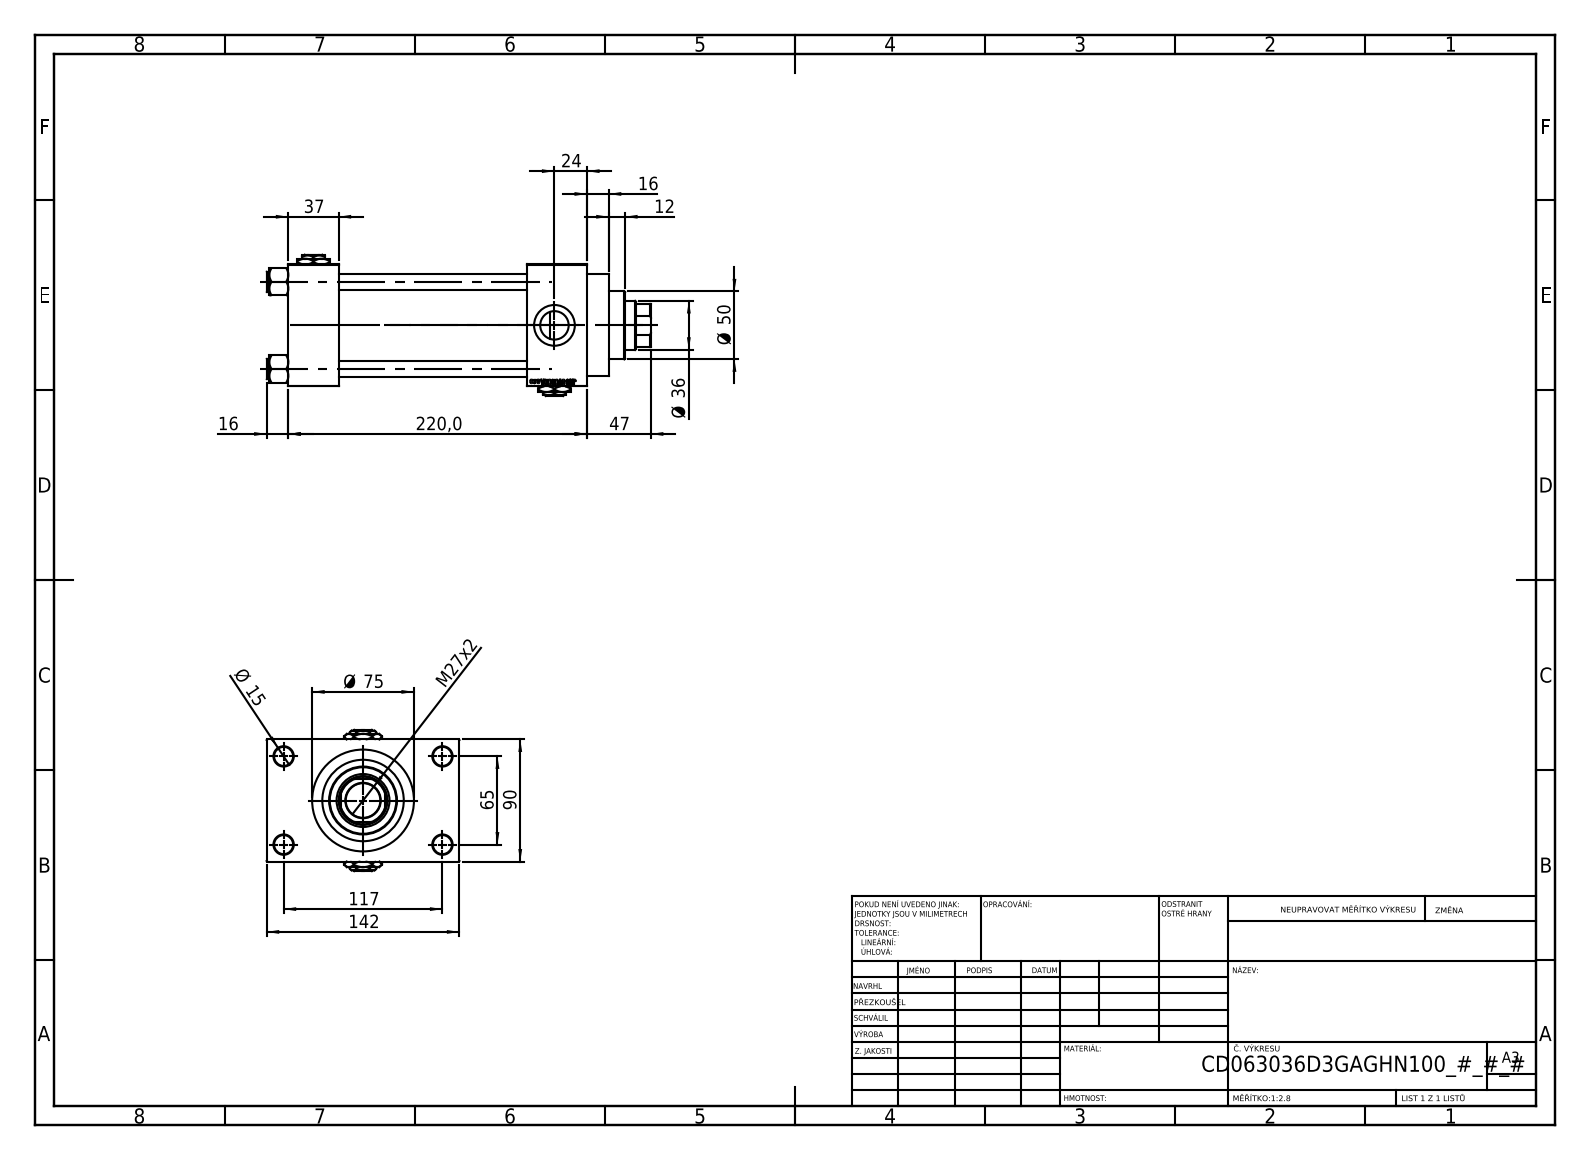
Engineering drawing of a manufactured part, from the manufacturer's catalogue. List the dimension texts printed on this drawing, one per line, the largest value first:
220,0
142
117
90
Ø 75
65
Ø 50
47
37
Ø 36
M27x2
24
16
16
Ø 15
12
